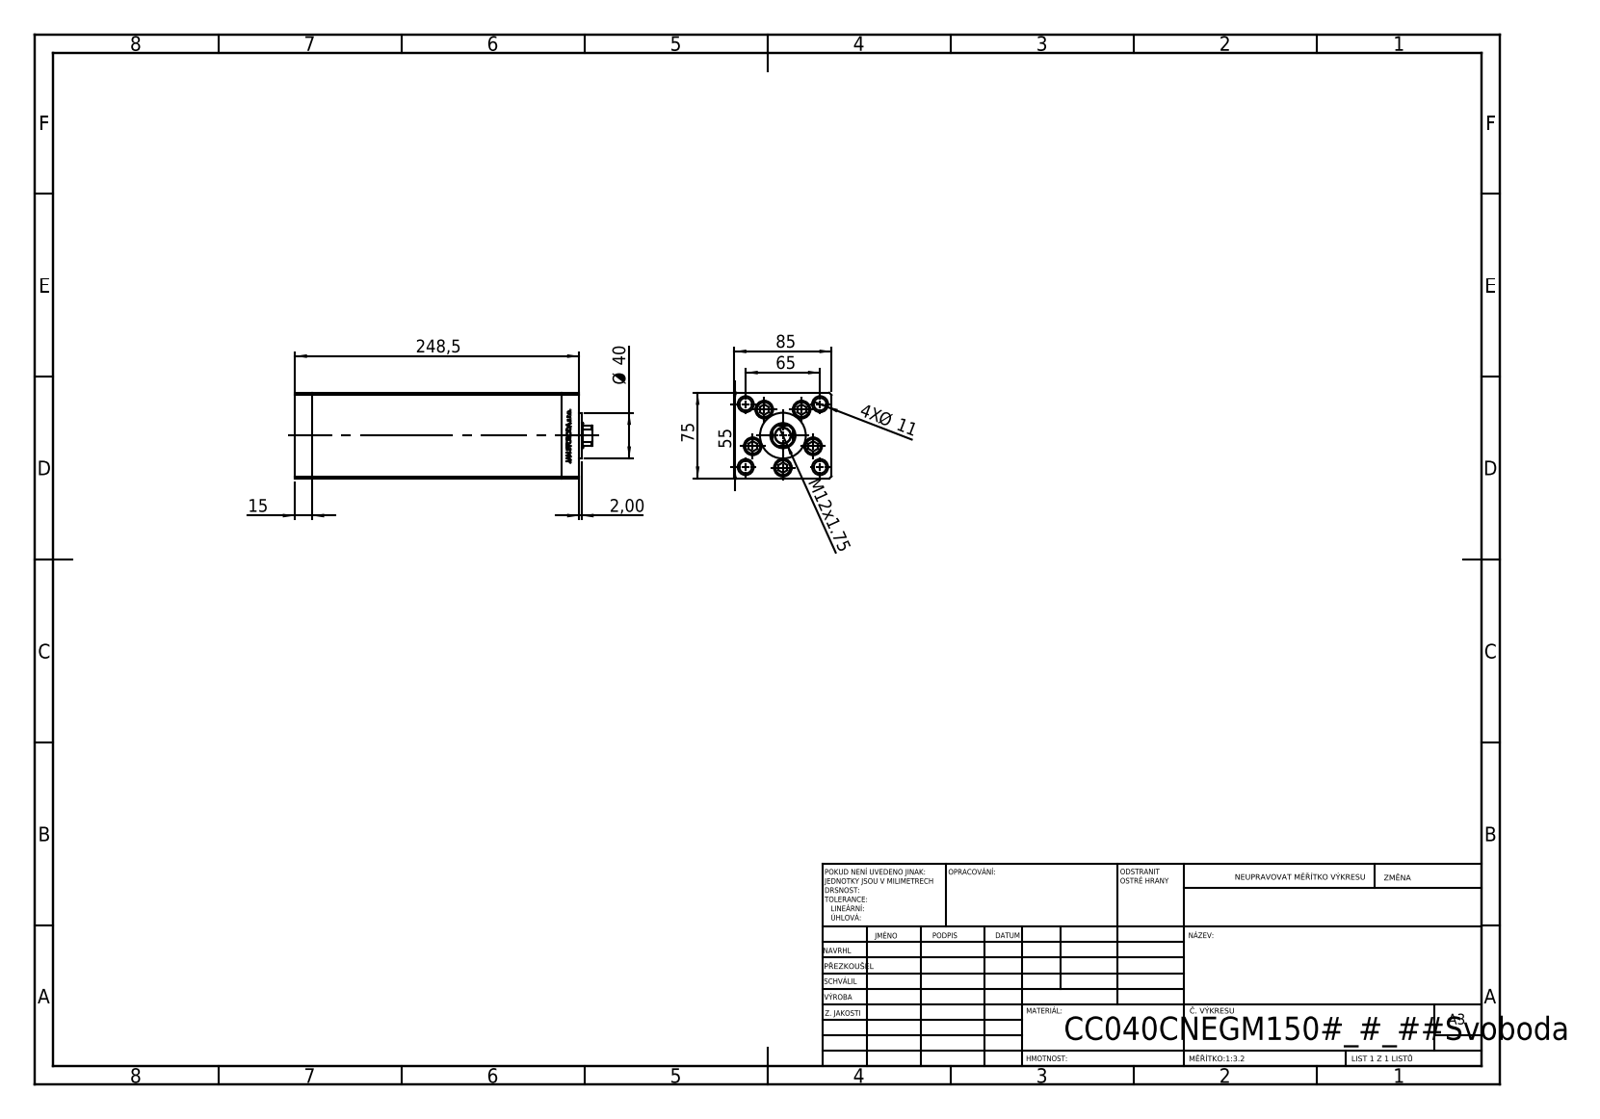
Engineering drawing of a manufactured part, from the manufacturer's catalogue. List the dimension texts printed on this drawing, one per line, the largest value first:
248,5
85
75
65
55
Ø 40
15
M12x1.75
4X Ø 11
2,00
